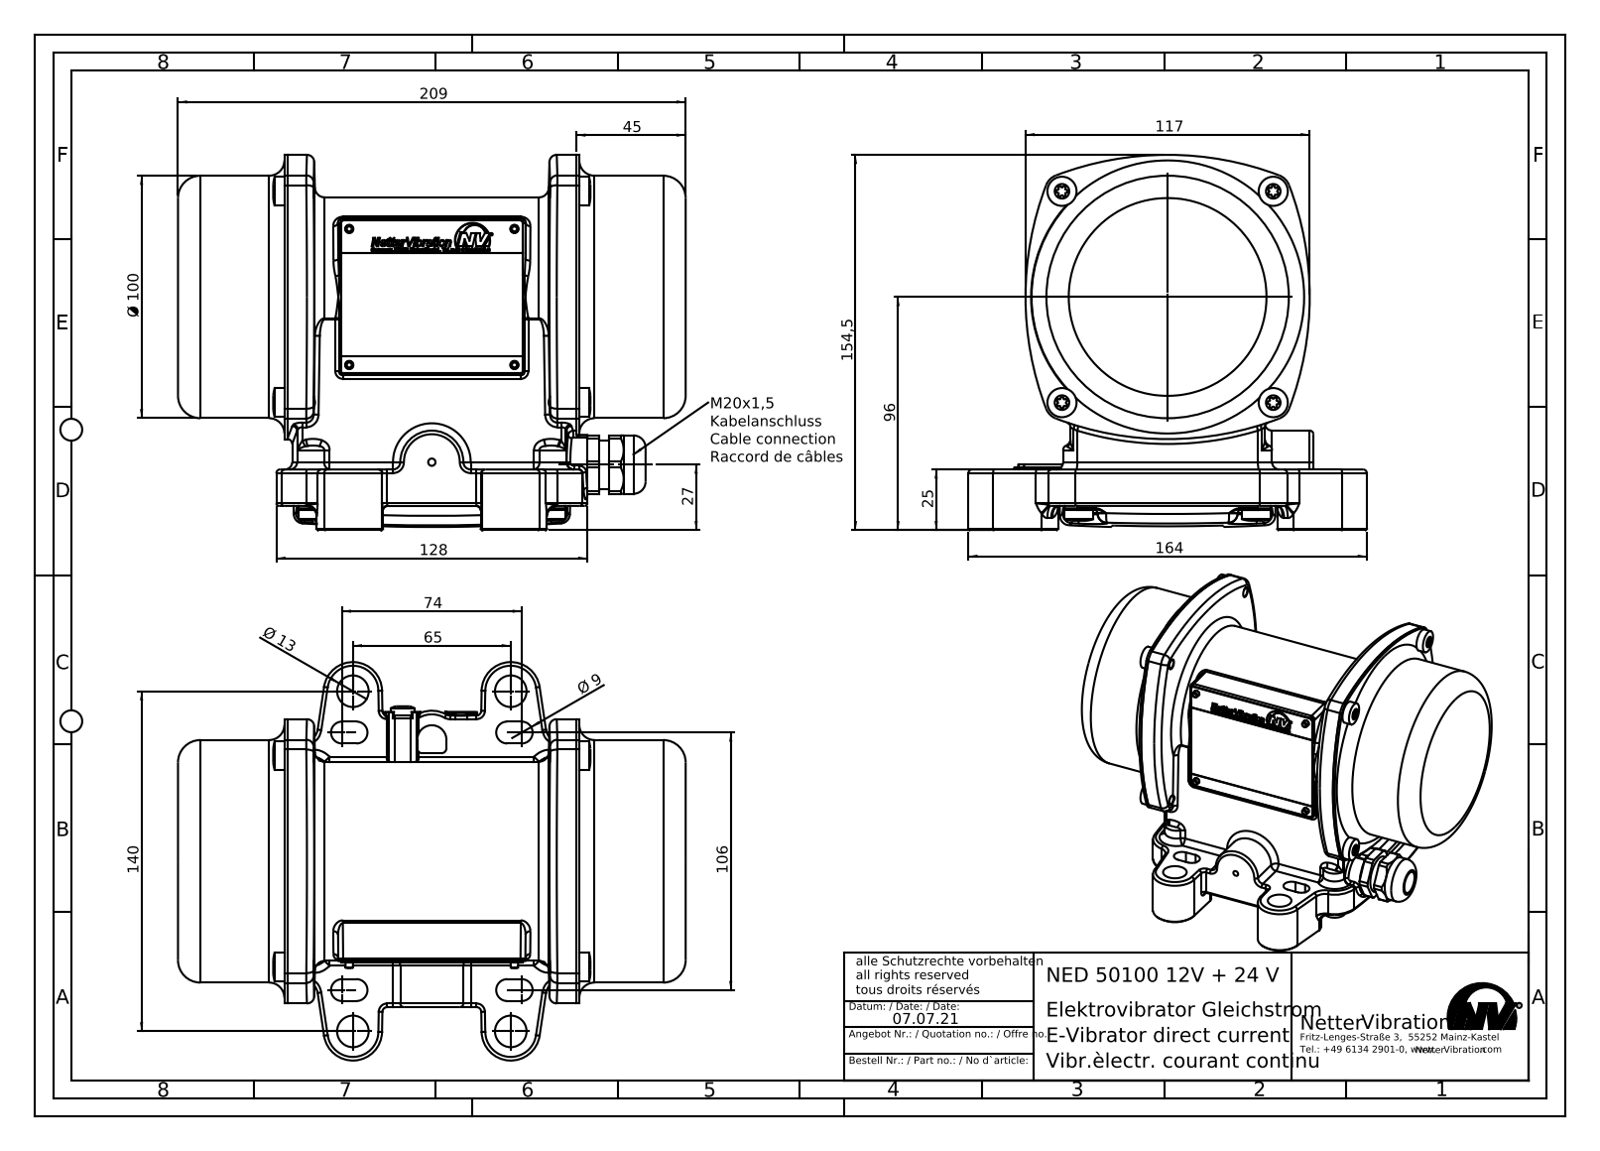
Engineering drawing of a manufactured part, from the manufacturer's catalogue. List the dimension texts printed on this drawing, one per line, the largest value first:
209
164
154,5
140
128
117
106
Ø 100
96
74
65
45
27
25
Ø 13
Ø 9
